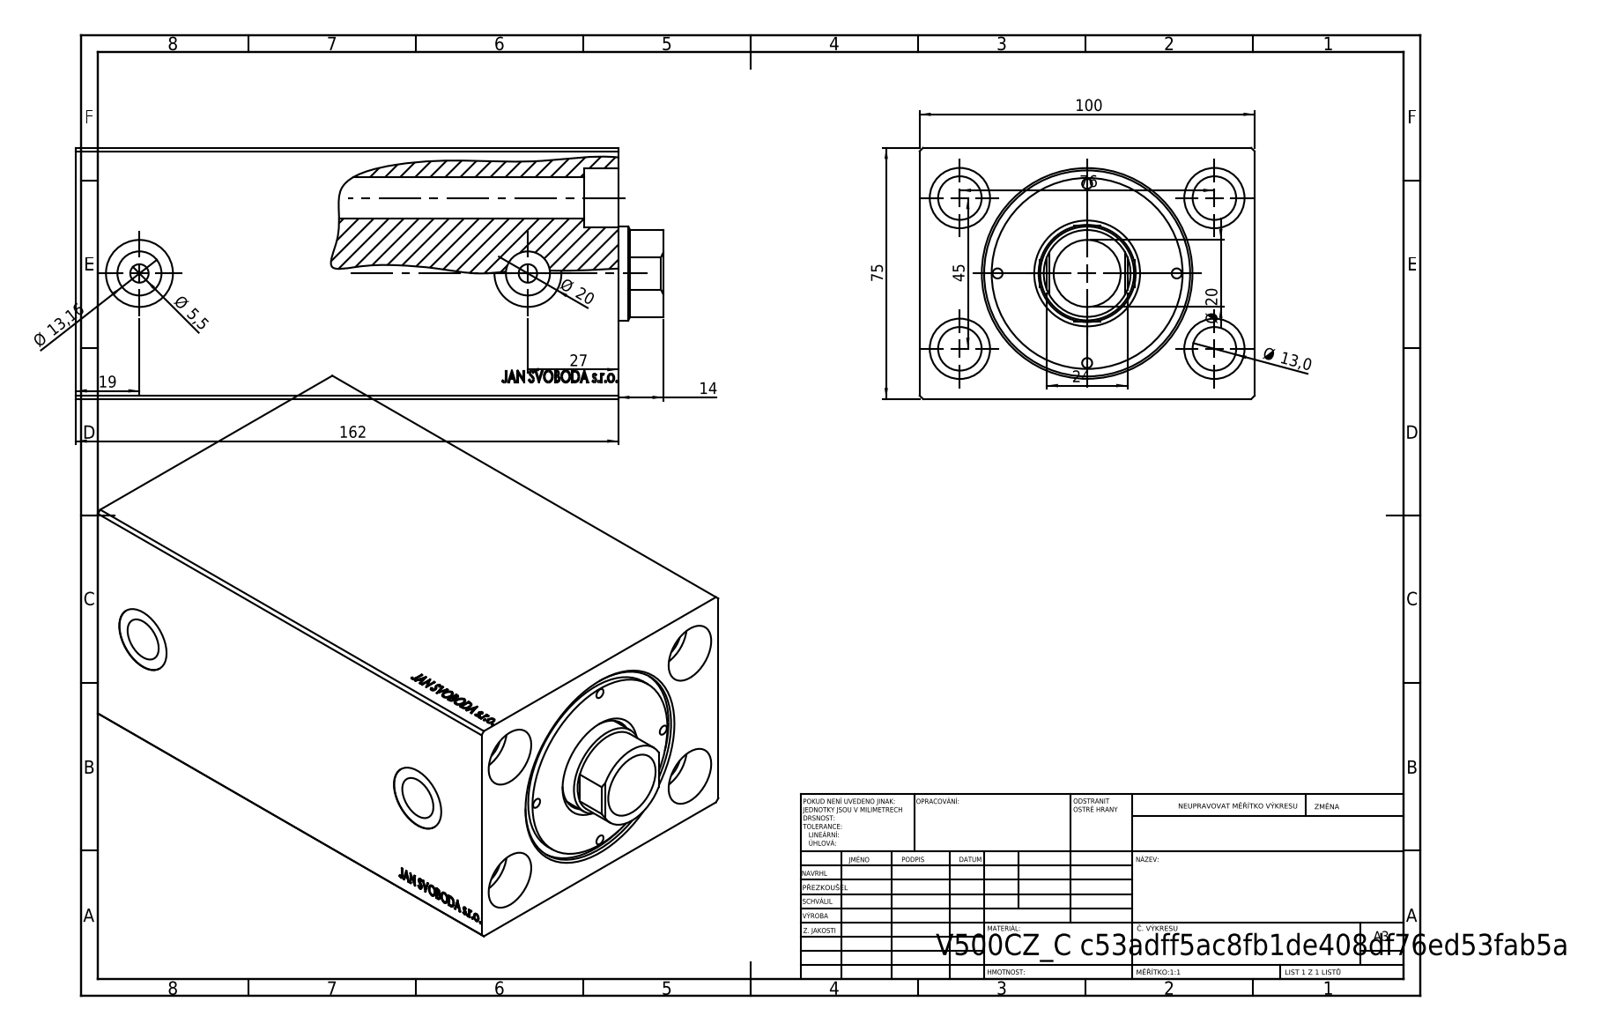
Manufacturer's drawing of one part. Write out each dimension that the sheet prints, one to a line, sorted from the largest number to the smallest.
162
100
76
75
45
27
24
Ø 20
Ø 20
19
14
Ø 13,16
Ø 13,0
Ø 5,5
